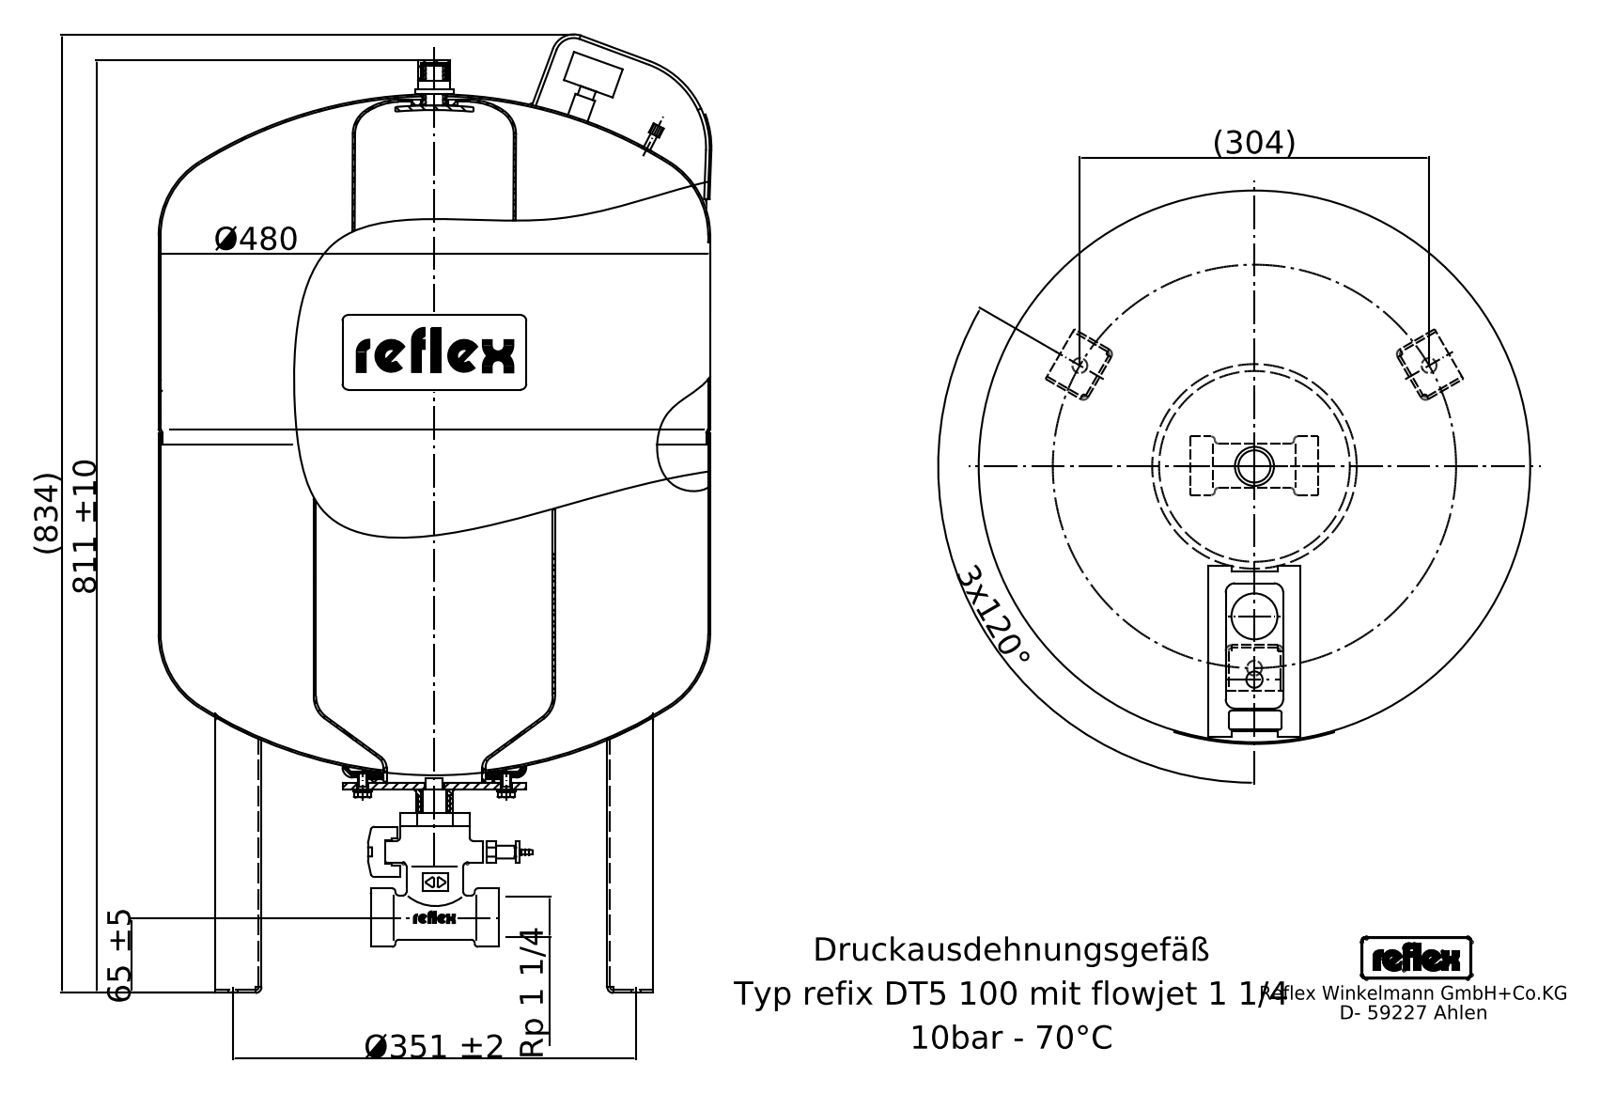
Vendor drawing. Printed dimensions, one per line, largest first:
(834)
811 ±10
Ø480
Ø351 ±2
(304)
3x120°
65 ±5
Rp 1 1/4
